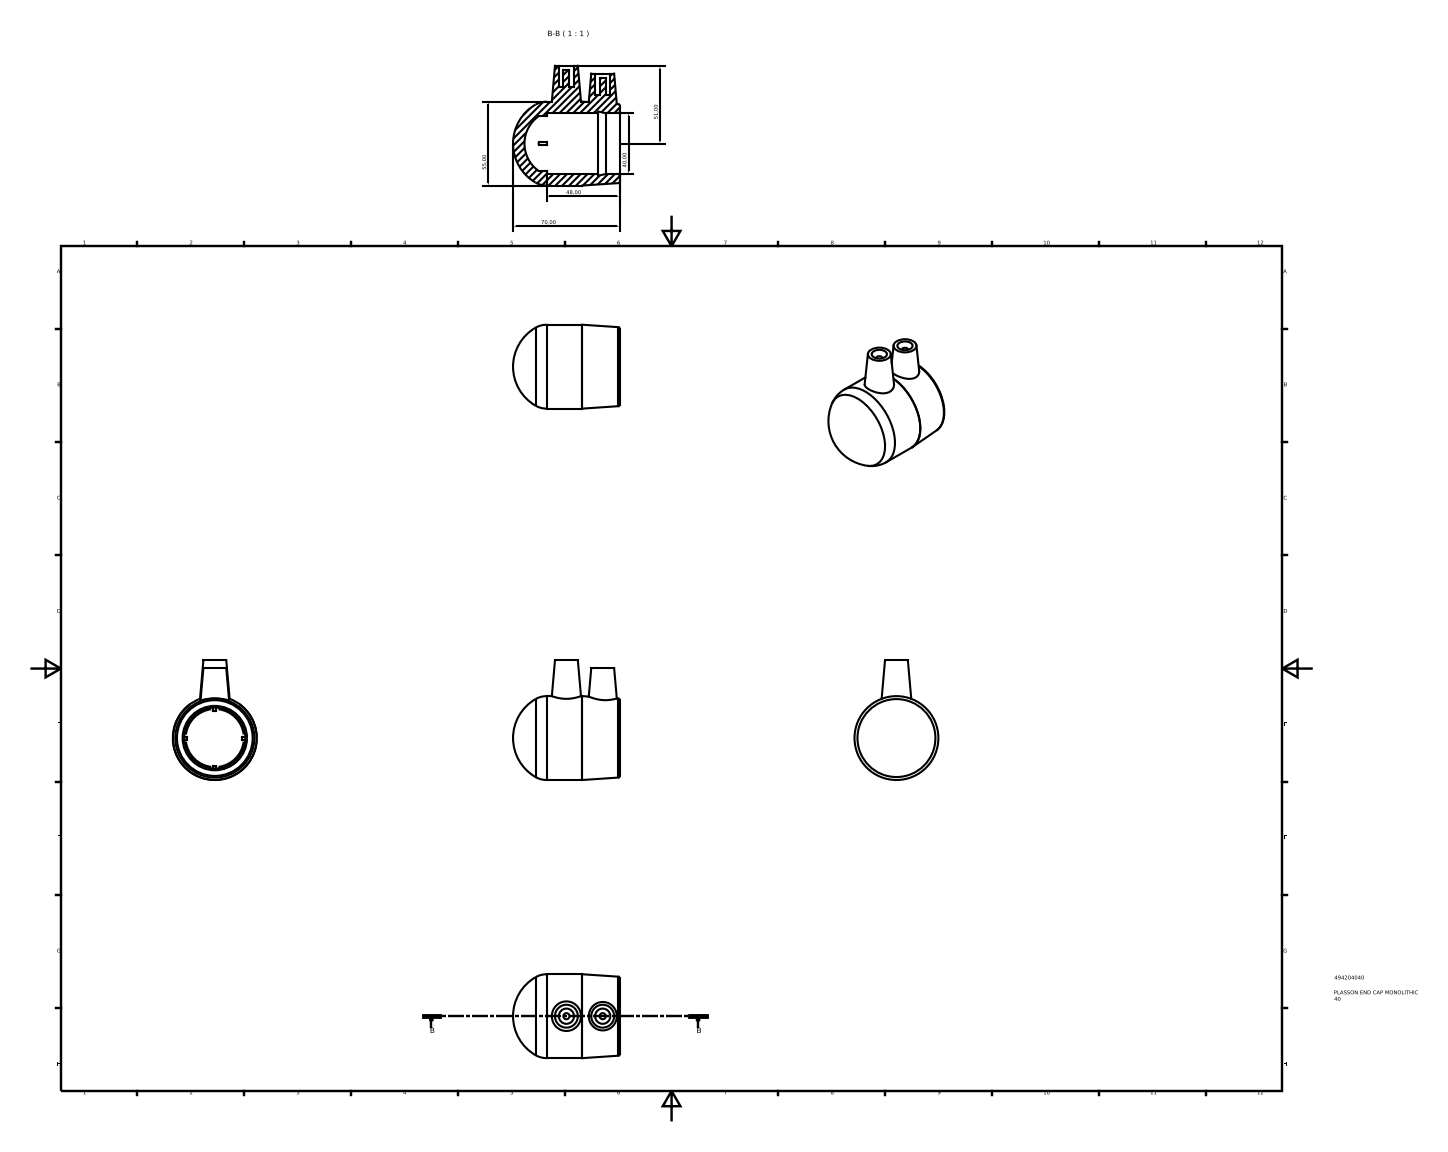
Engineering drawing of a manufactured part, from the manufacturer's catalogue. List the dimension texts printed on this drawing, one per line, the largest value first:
70,00
55,00
51,00
48,00
40,00
